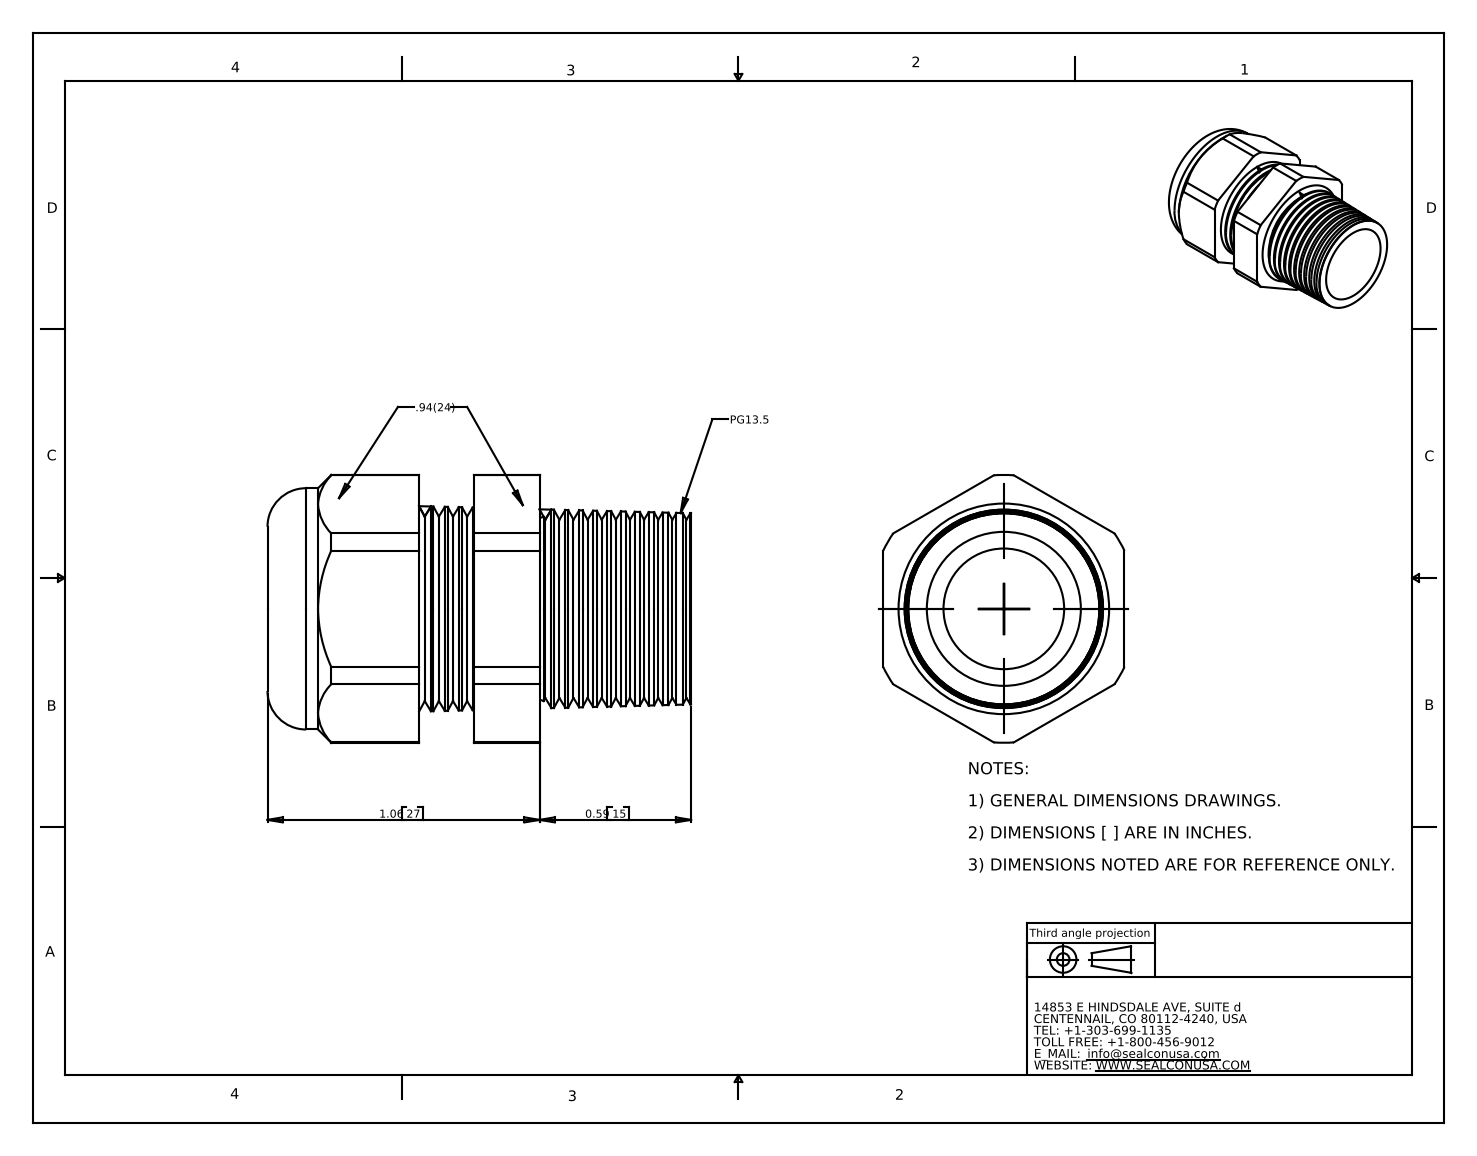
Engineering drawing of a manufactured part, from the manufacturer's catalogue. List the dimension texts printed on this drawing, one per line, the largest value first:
1.06 27
0.59 15
